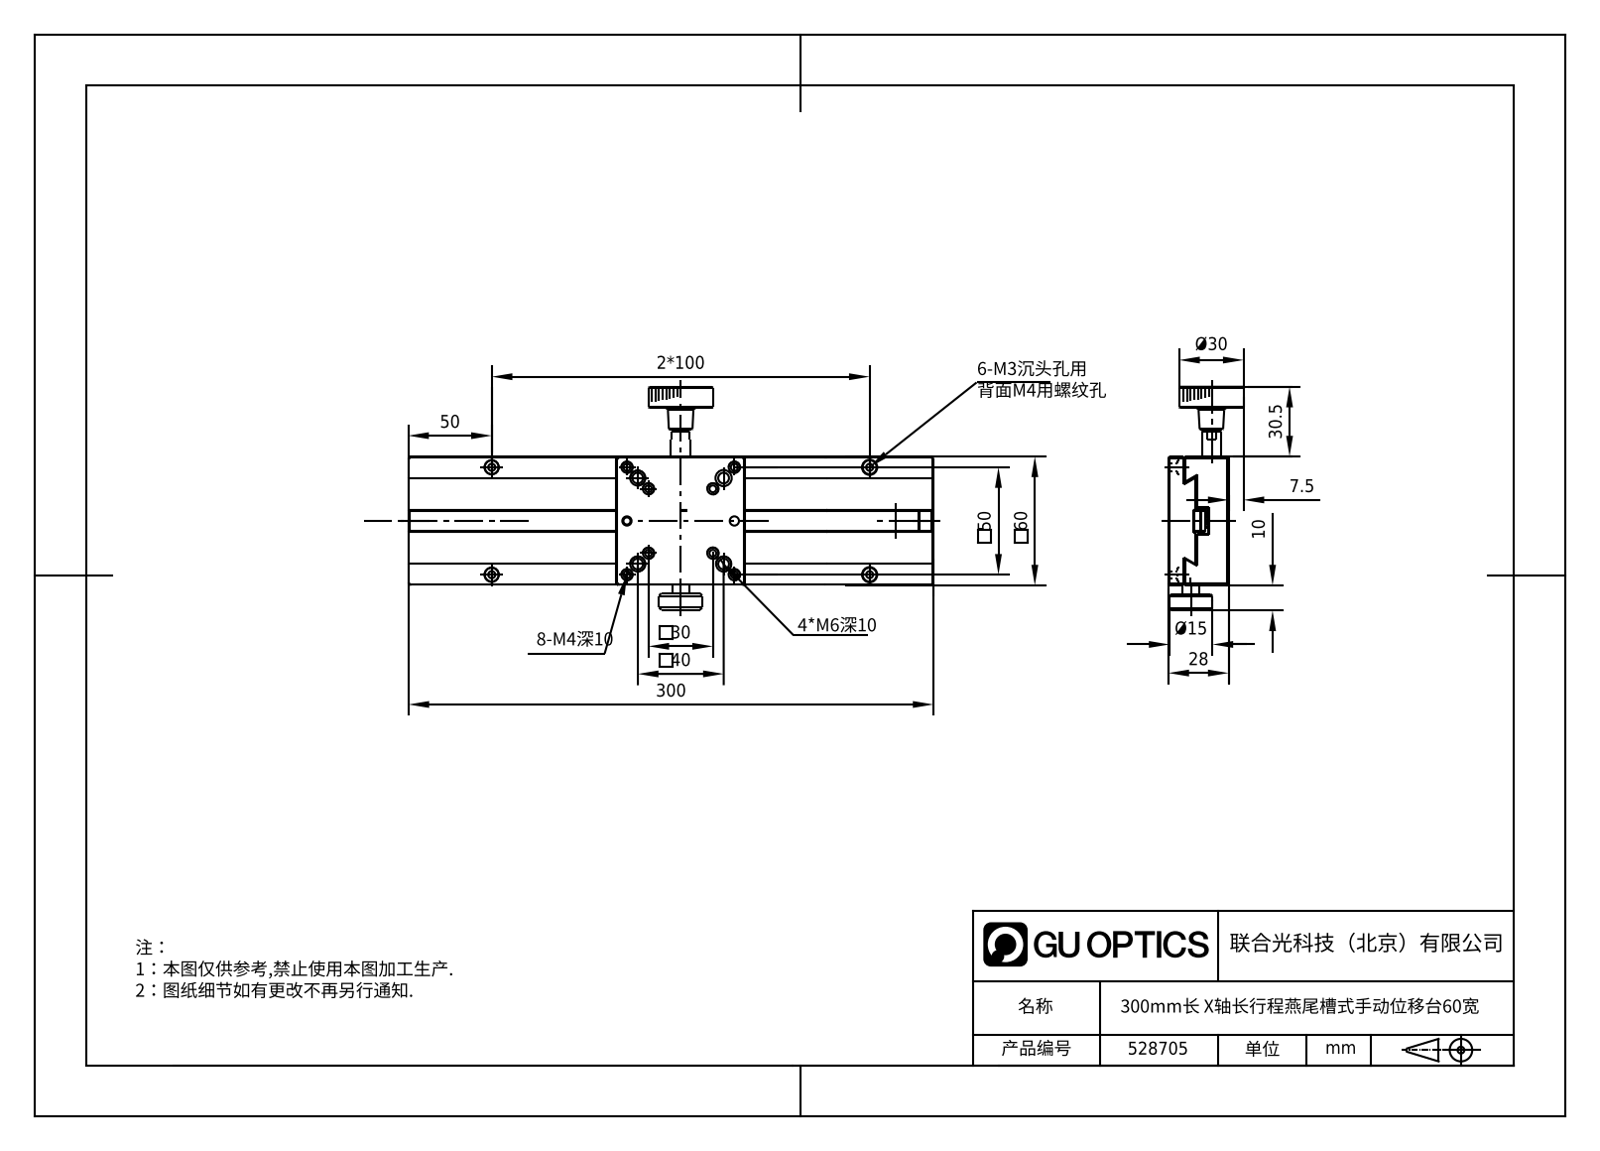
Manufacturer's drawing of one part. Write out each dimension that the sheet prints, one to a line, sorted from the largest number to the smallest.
300
60
50
50
40
30.5
30
Ø30
28
Ø15
10
7.5
2*100
